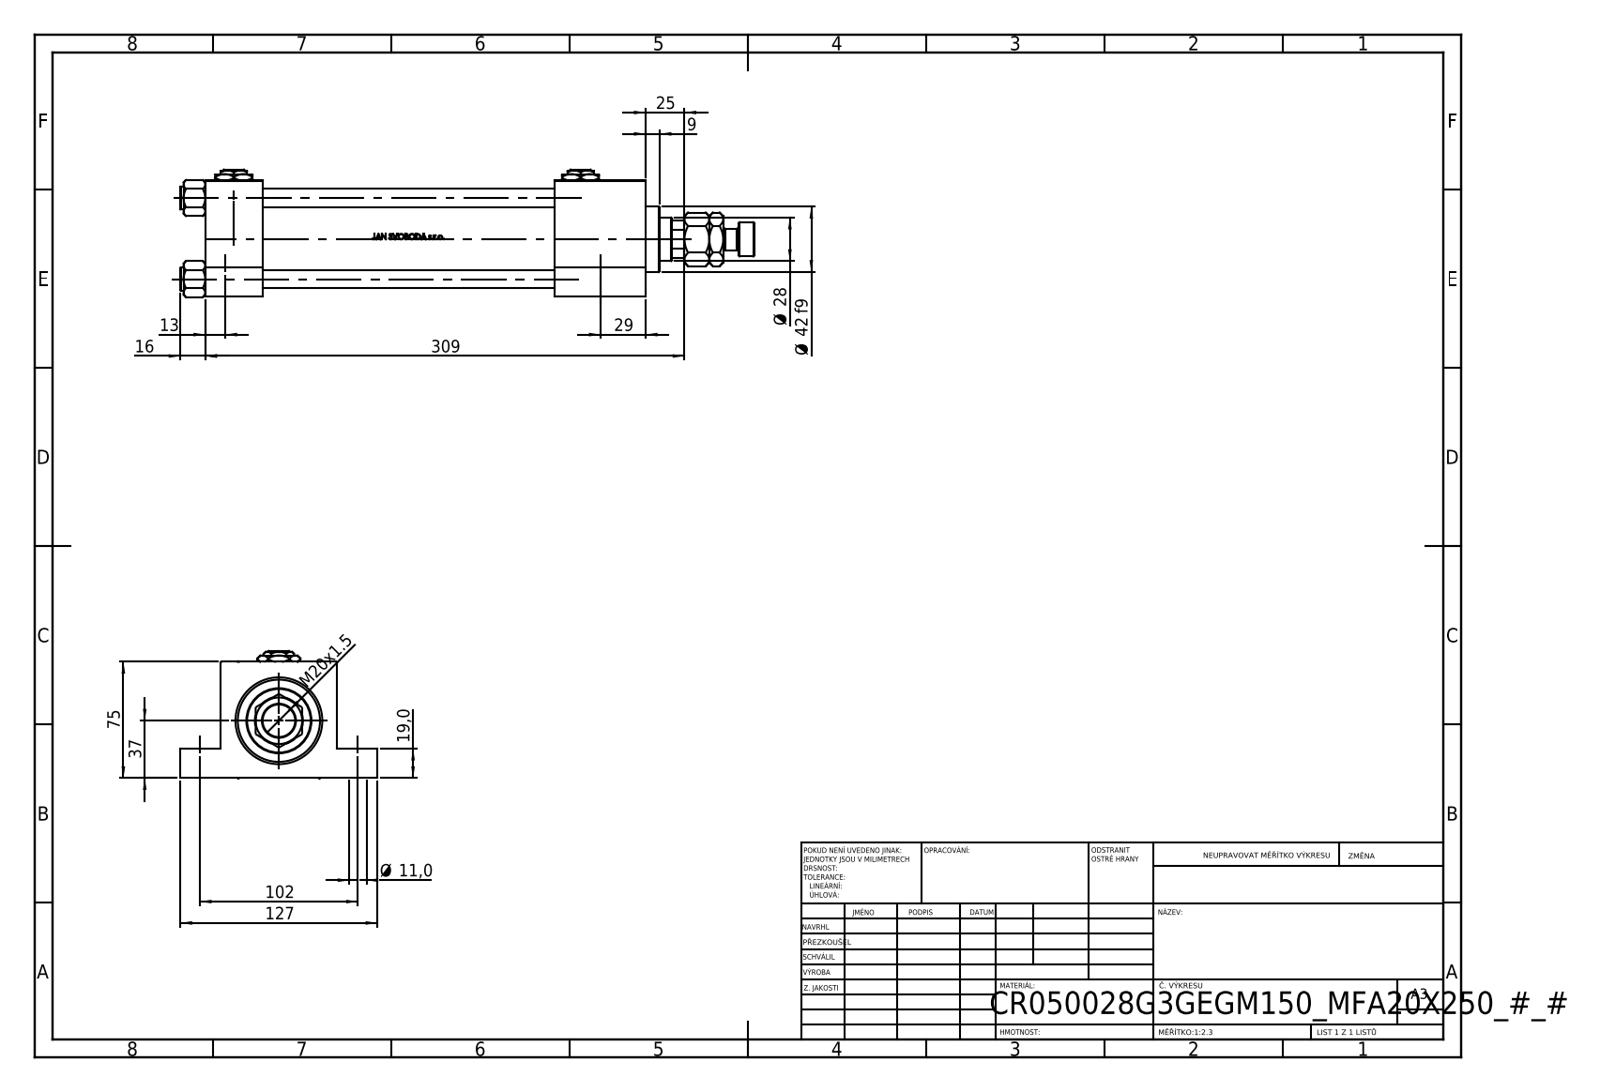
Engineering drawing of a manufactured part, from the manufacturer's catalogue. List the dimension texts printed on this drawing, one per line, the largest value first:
309
127
102
75
Ø 42 f9
37
29
Ø 28
25
M20x1.5
19,0
16
13
Ø 11,0
9
